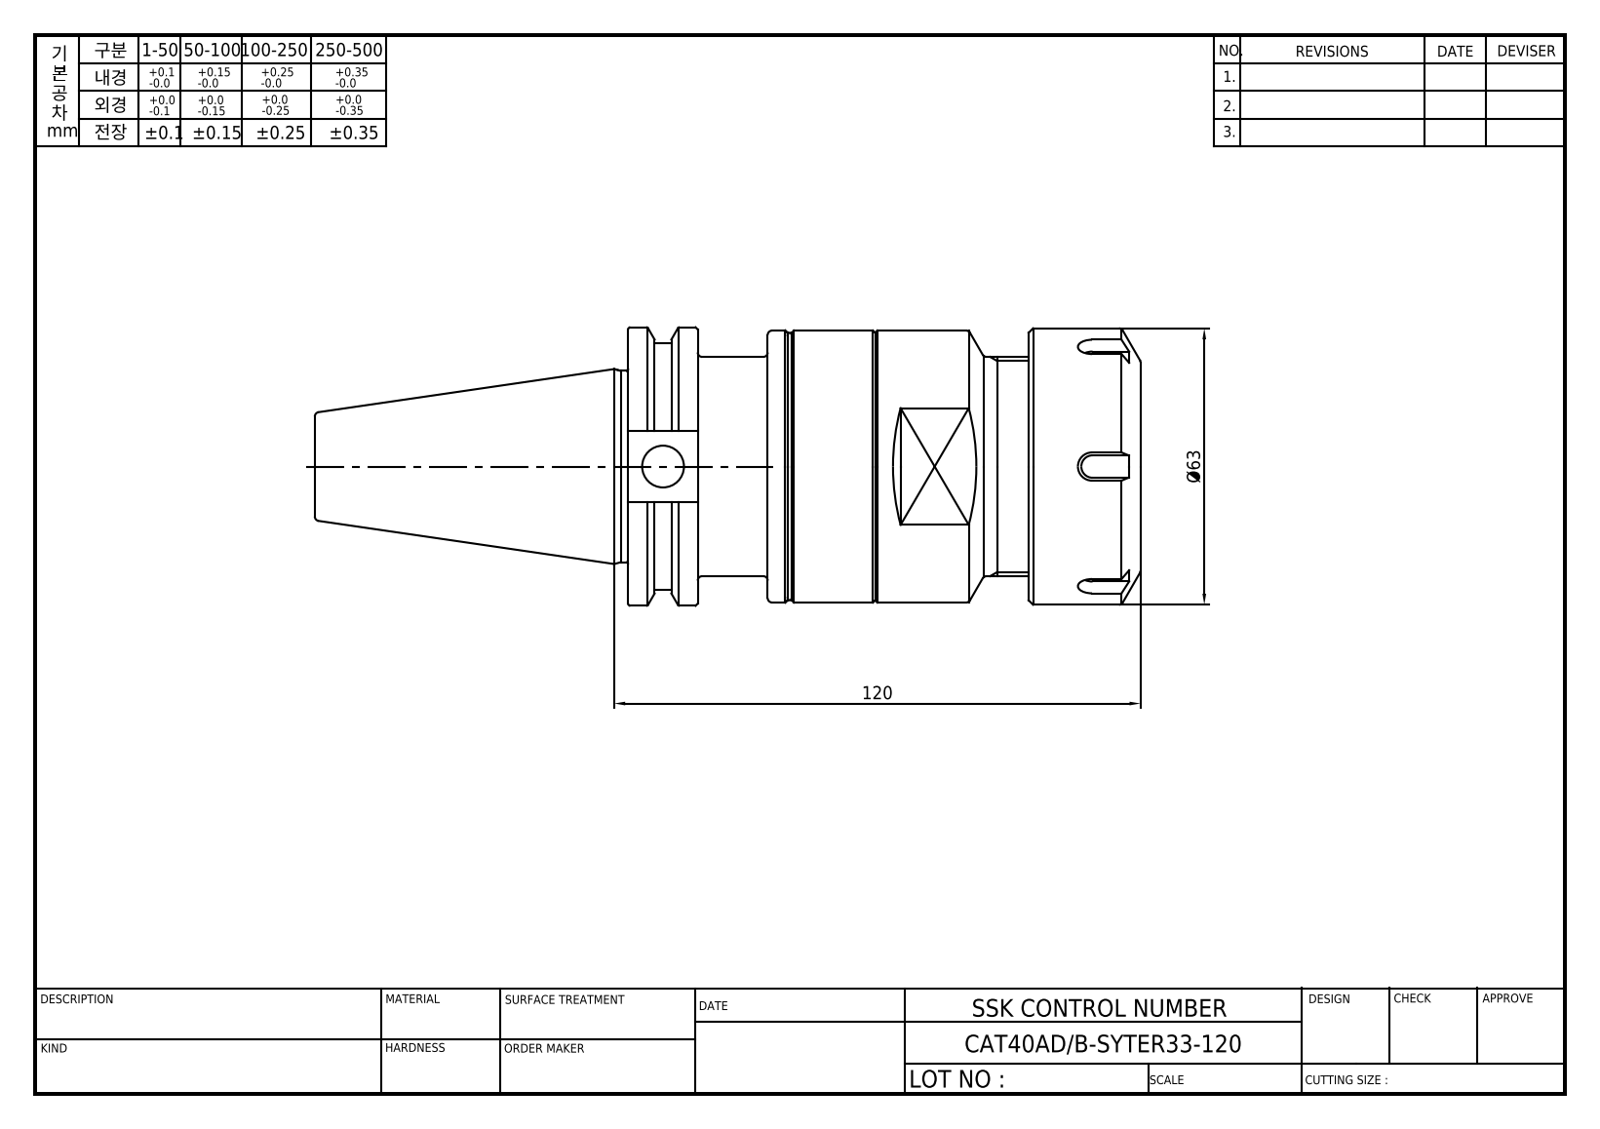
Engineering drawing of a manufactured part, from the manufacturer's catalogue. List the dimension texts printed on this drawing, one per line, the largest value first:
120
Ø63
